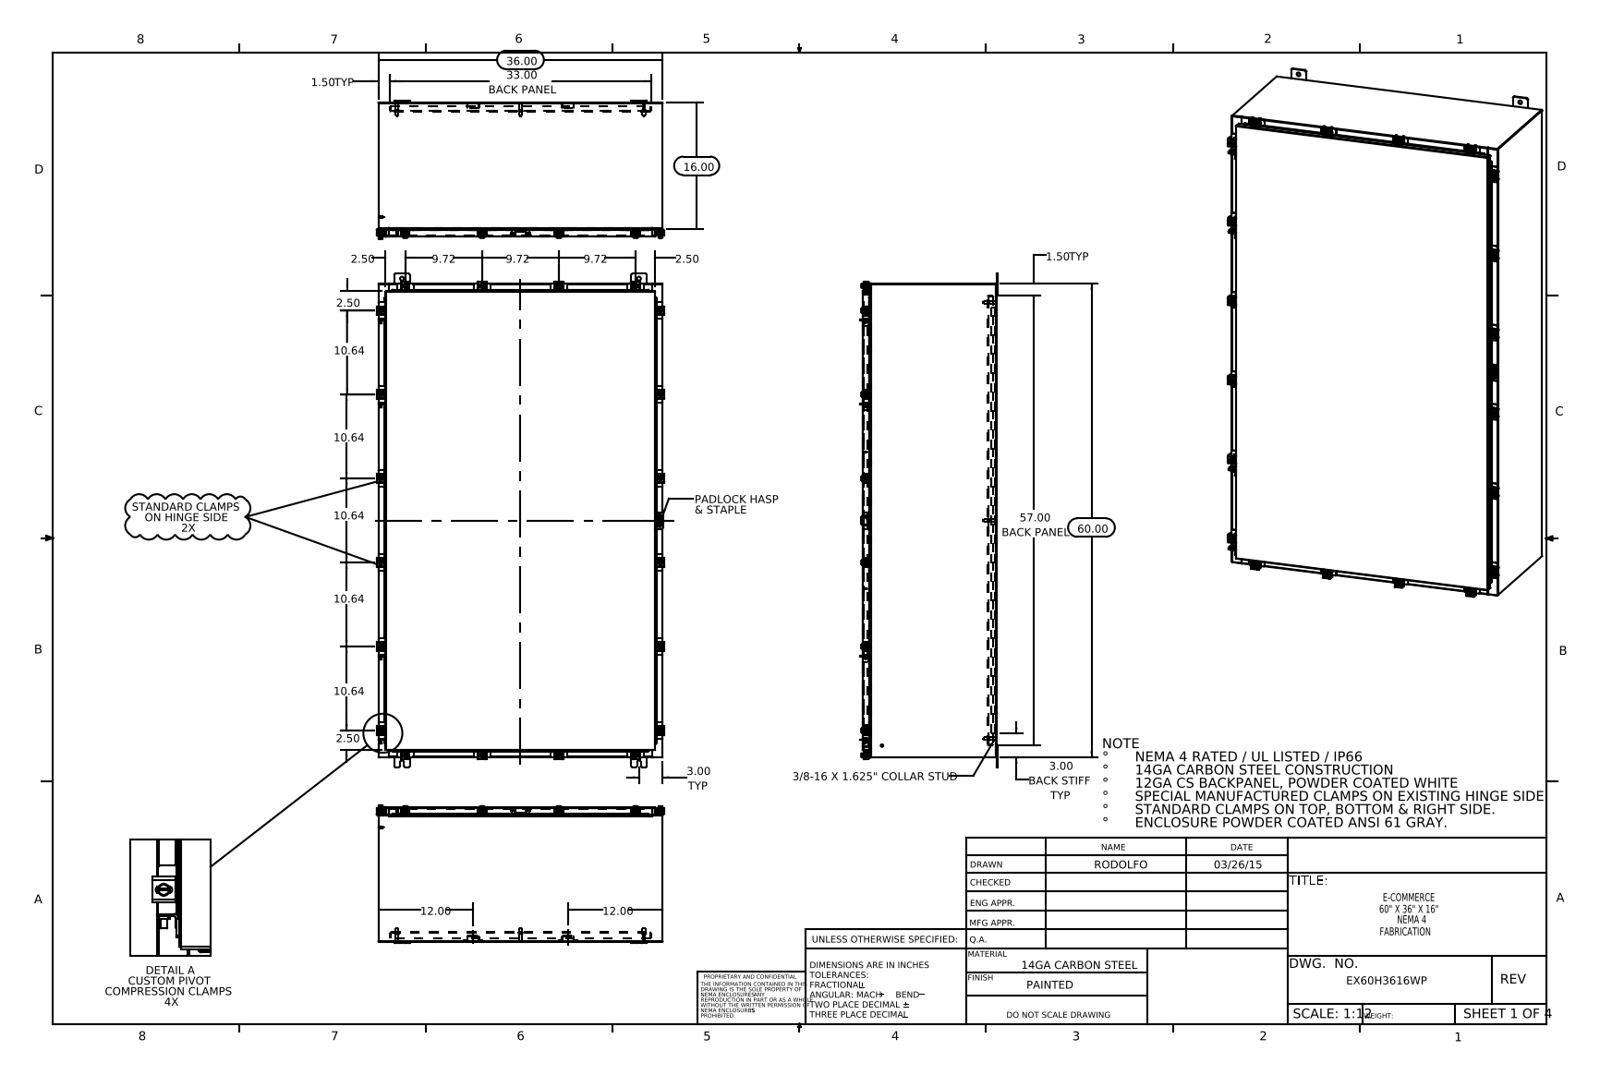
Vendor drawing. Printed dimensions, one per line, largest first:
60.00
57.00 BACK PANEL
36.00
33.00 BACK PANEL
16.00
12.00
12.00
10.64
10.64
10.64
10.64
10.64
9.72
9.72
9.72
3.00 TYP
3.00 BACK STIFF TYP
2.50
2.50
2.50
2.50
1.50 TYP
1.50 TYP
